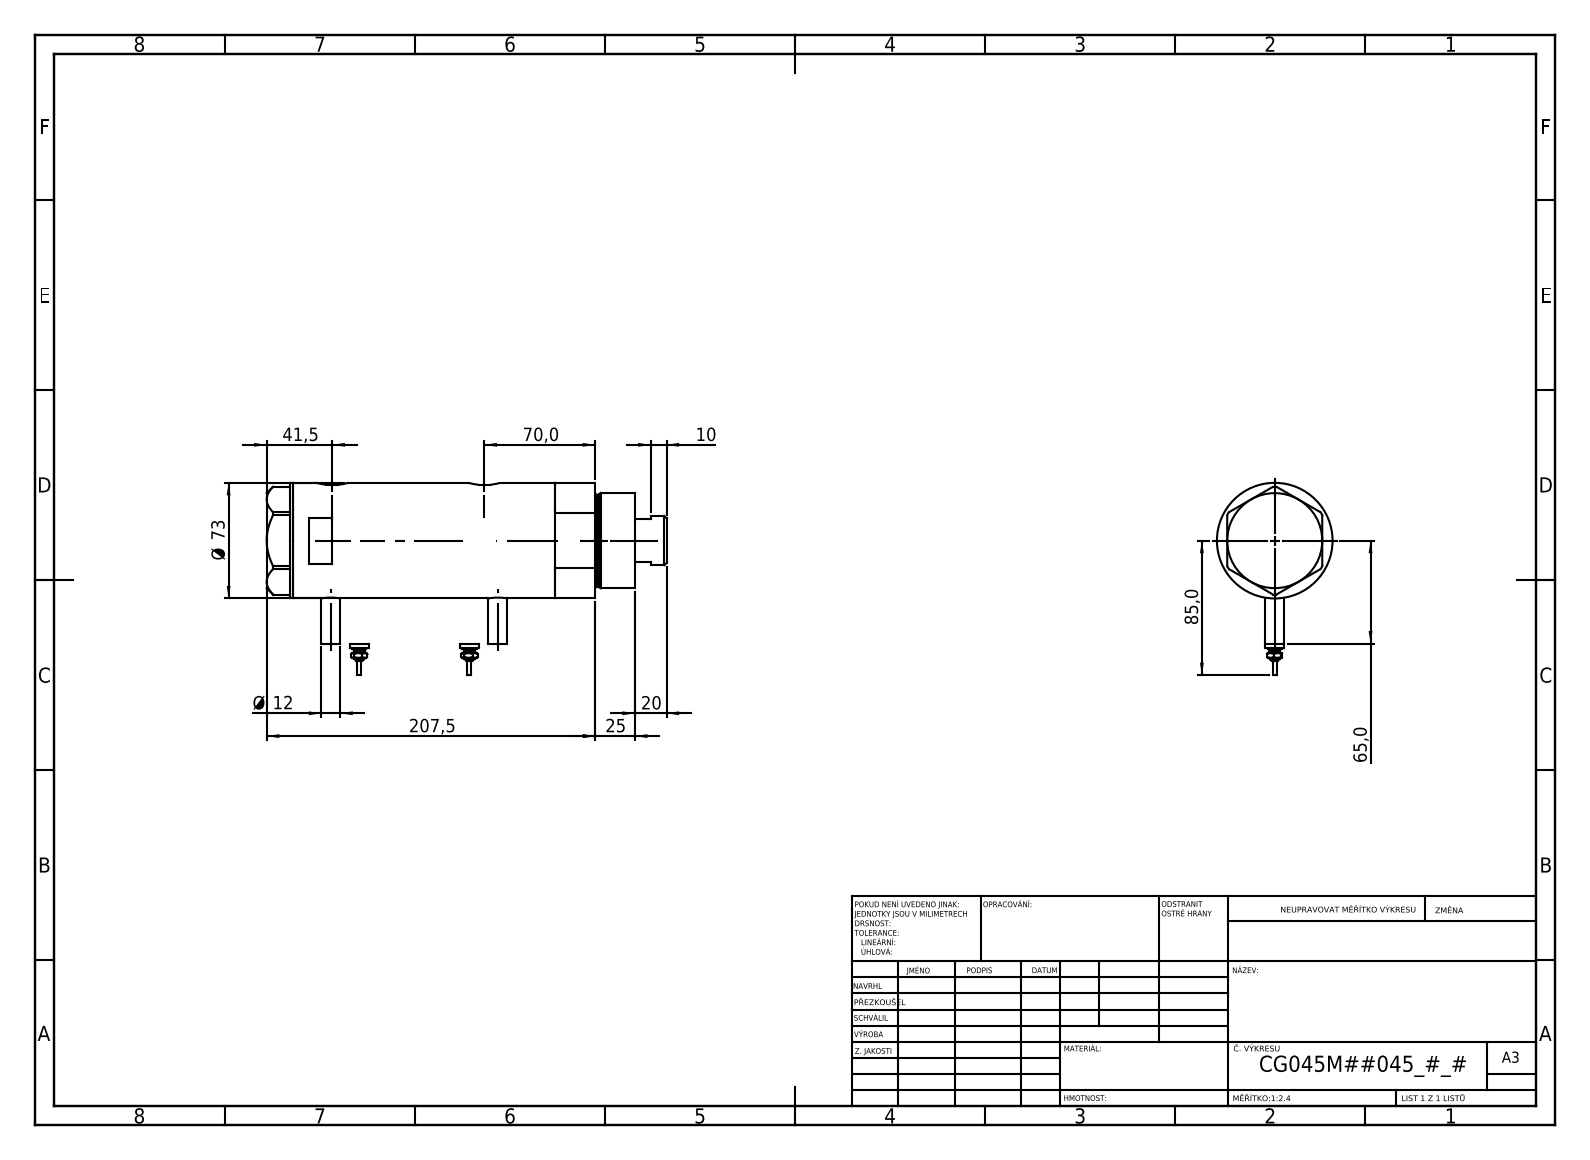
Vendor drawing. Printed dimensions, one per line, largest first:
207,5
85,0
Ø 73
70,0
65,0
41,5
25
20
Ø 12
10
